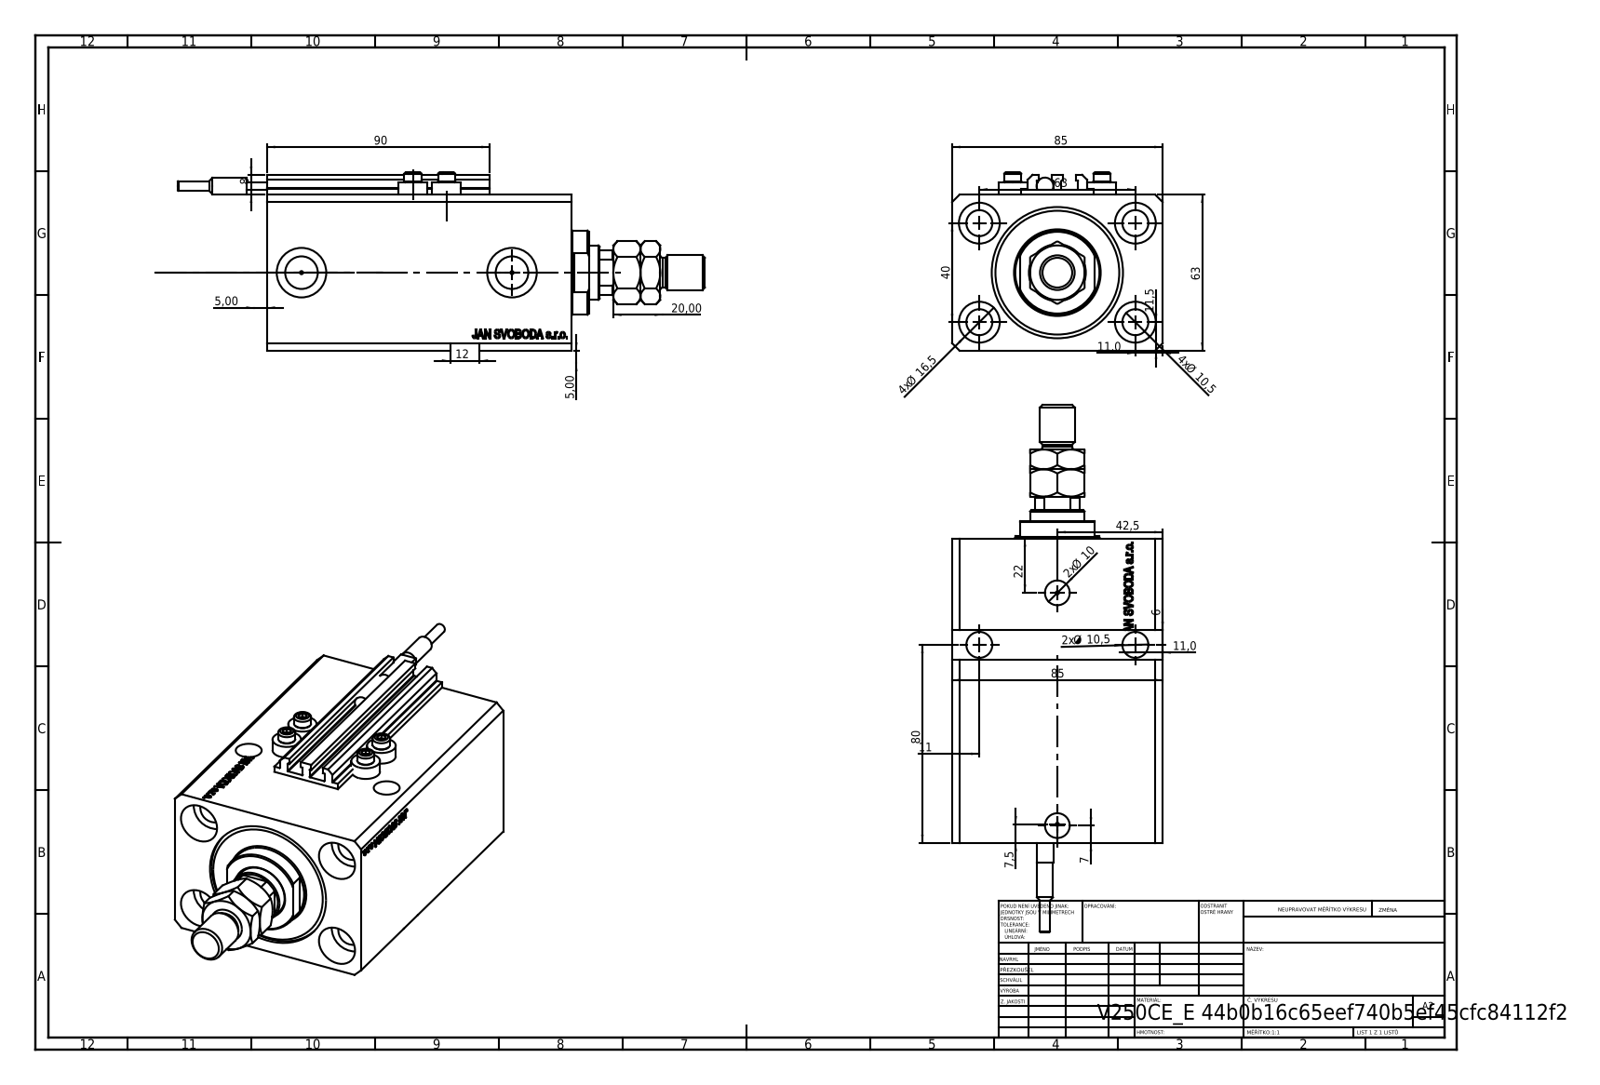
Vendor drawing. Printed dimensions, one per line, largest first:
90
85
85
80
63
63
42,5
40
22
20,00
4x Ø 16,5
12
11,5
11,0
11,0
11
4x Ø 10,5
2x Ø 10,5
2x Ø 10
8
7,5
7
6
5,00
5,00
